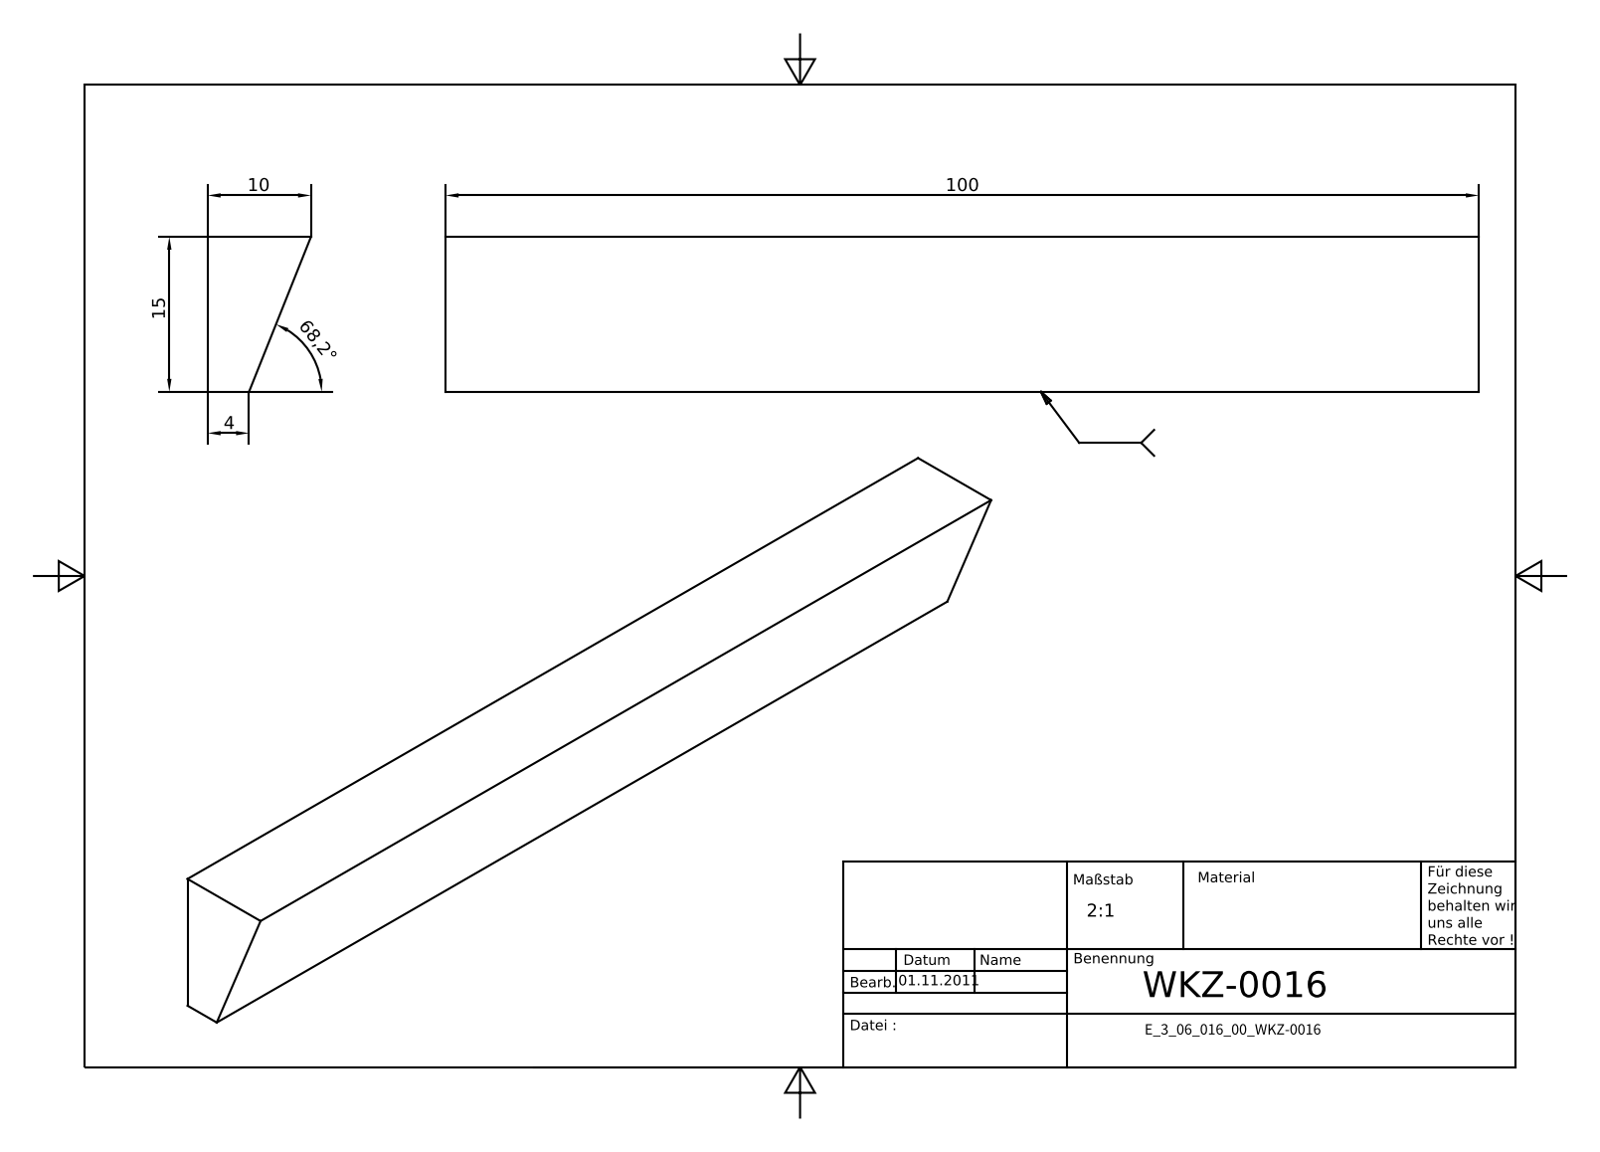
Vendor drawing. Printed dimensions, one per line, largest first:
100
68,2°
15
10
4
